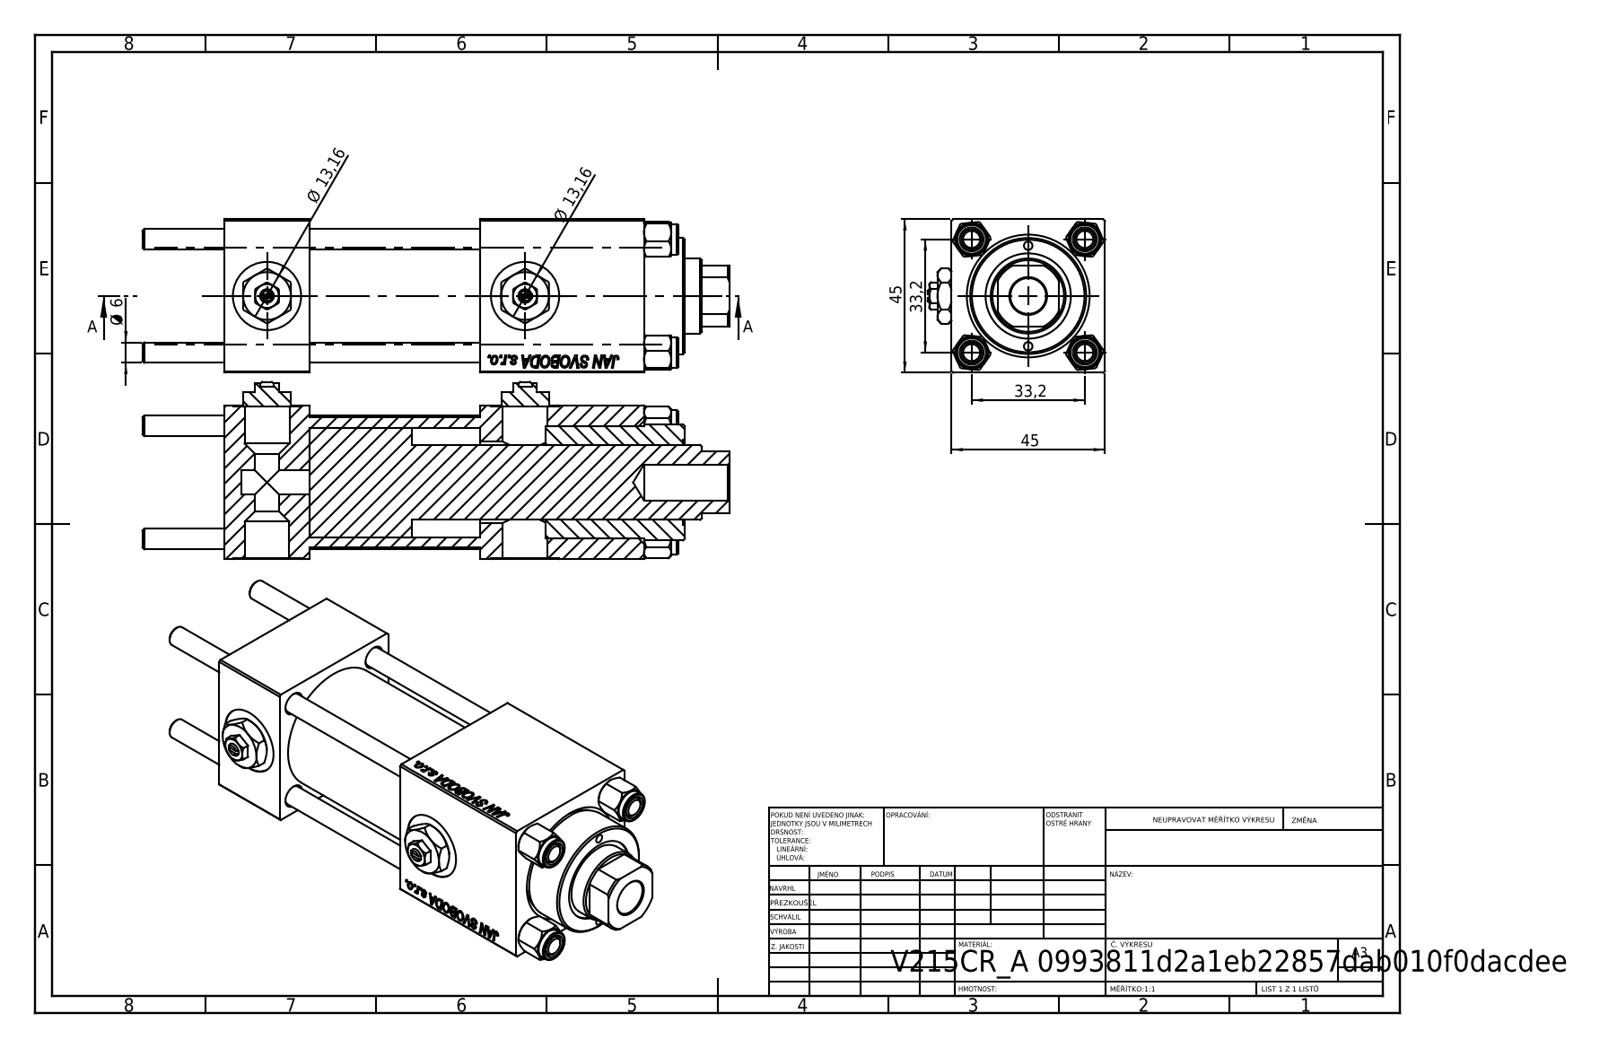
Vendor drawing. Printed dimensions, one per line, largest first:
45
45
33,2
33,2
Ø 13,16
Ø 13,16
Ø 6
